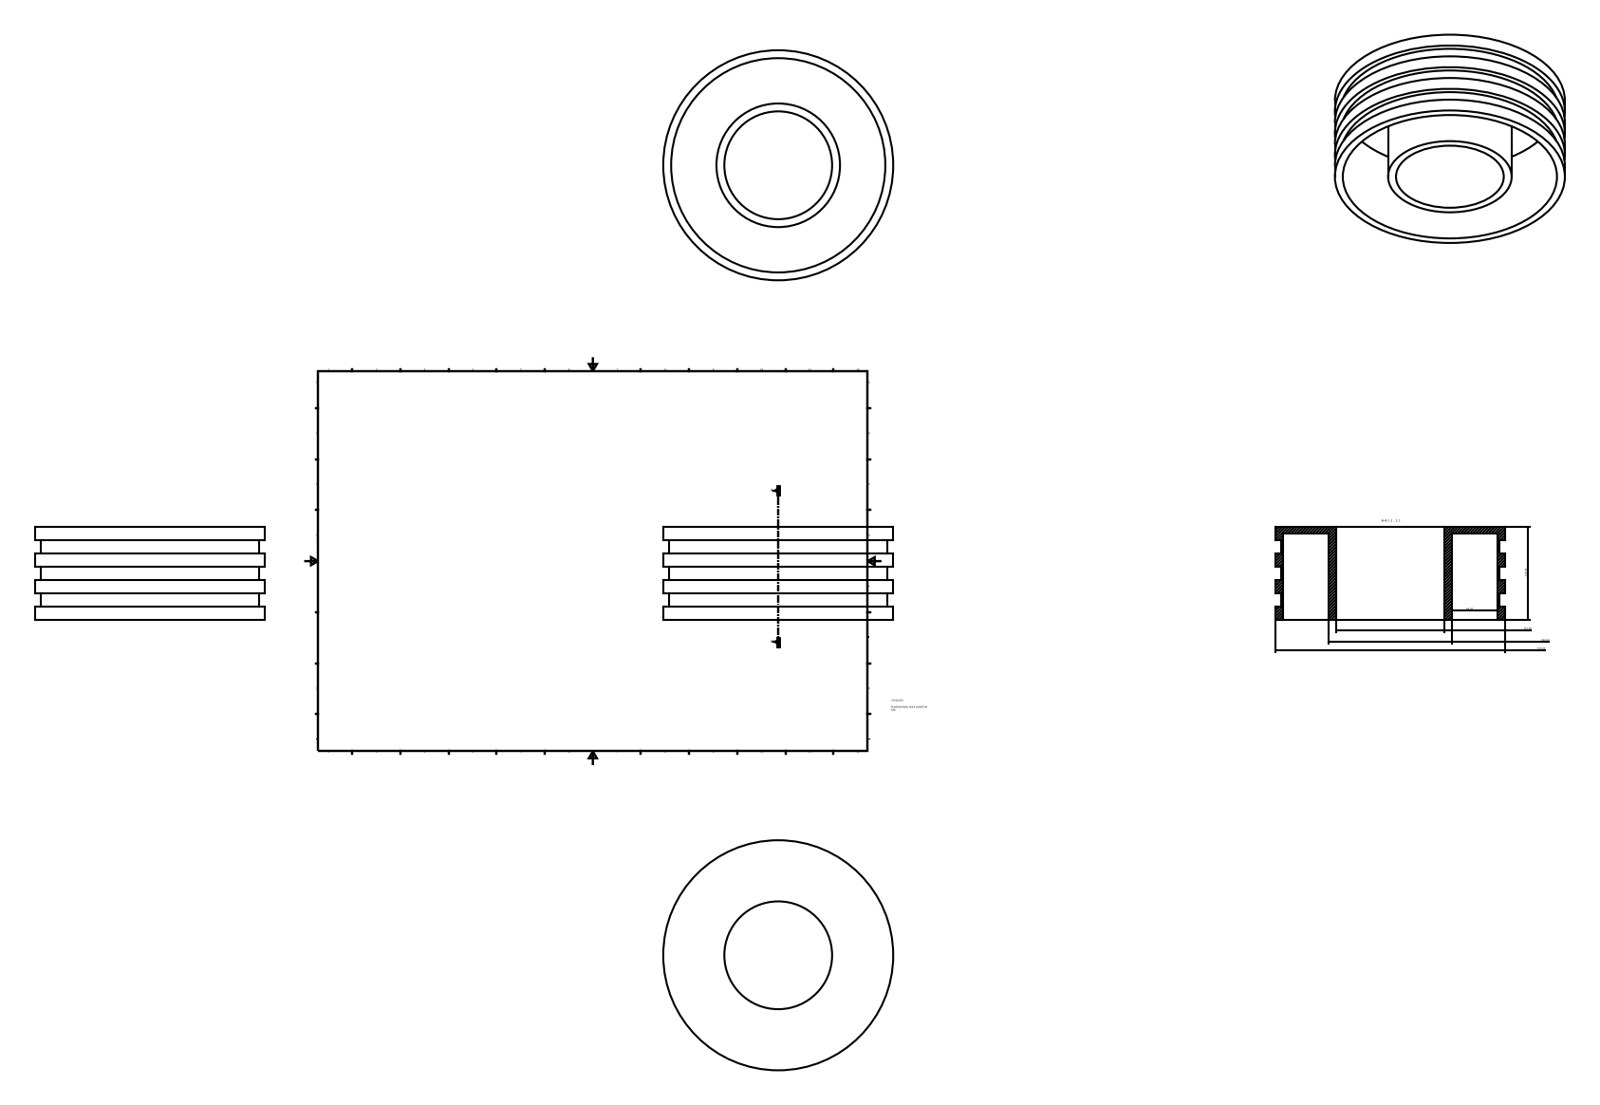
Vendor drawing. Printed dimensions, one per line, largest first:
335,00
180,00
157,00
135,00
66,00
